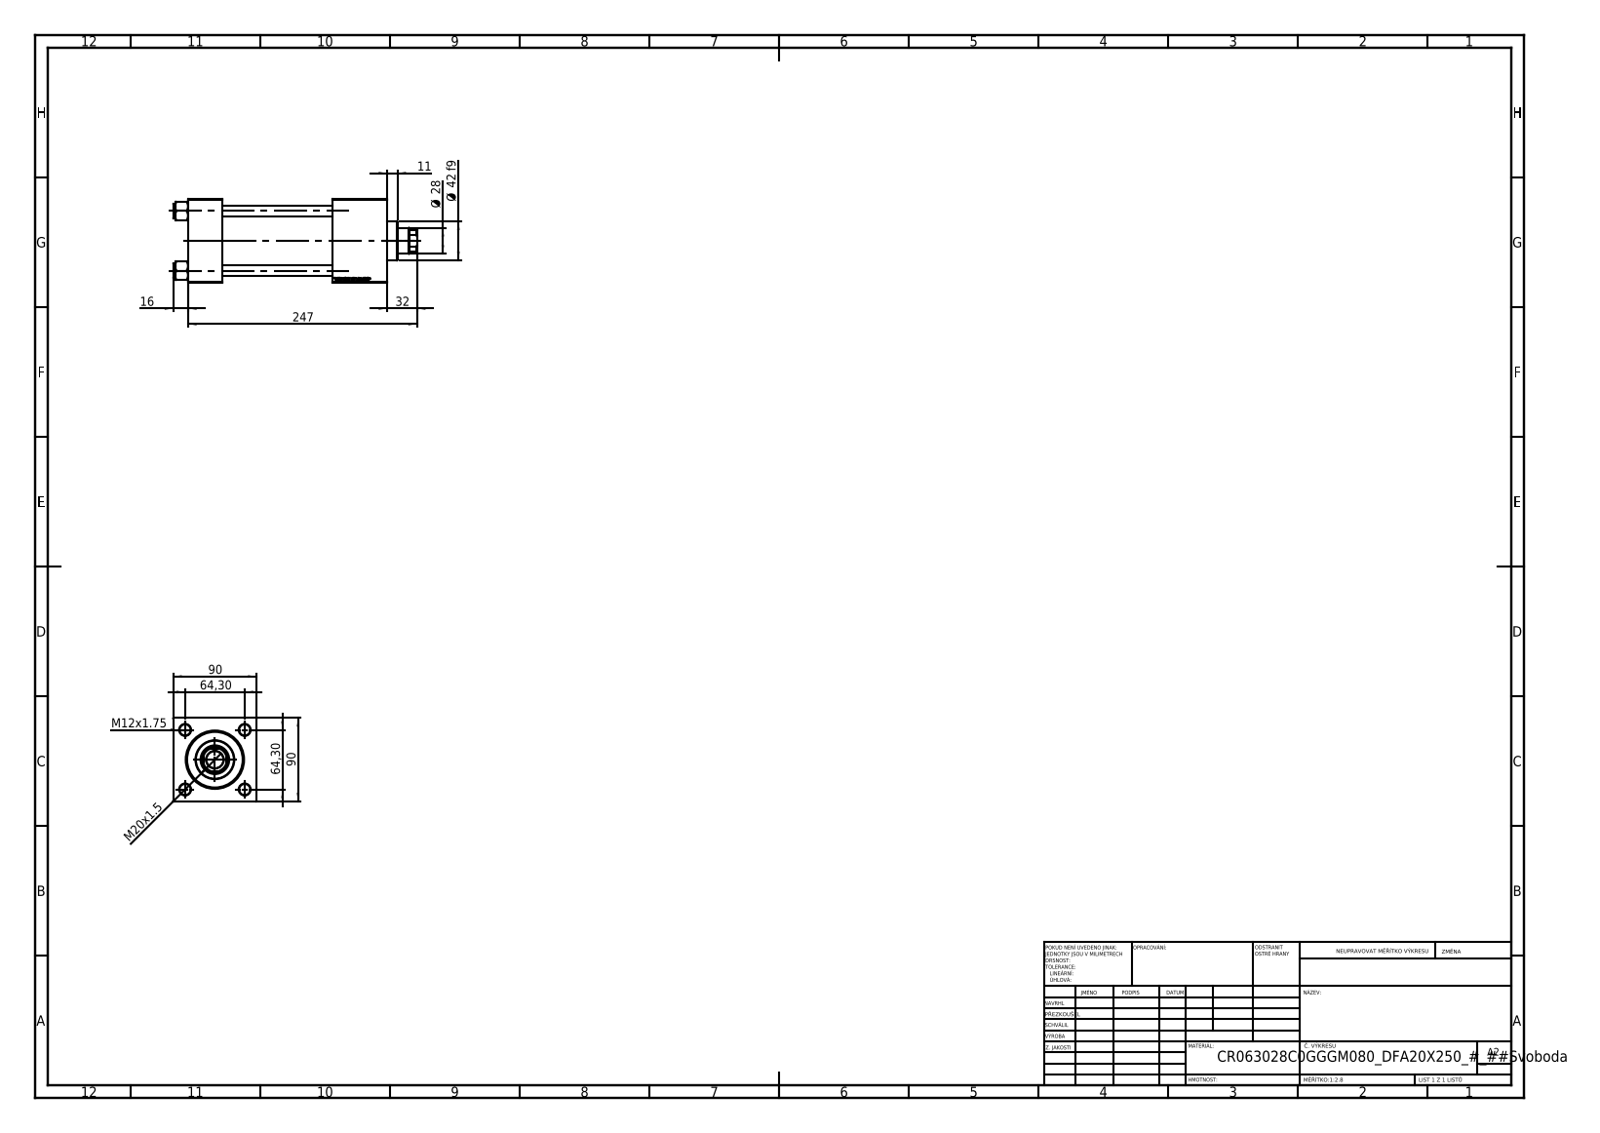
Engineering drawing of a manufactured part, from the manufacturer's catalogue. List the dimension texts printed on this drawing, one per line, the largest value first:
247
90
90
64,30
64,30
Ø 42 f9
32
Ø 28
M20x1.5
16
M12x1.75
11
